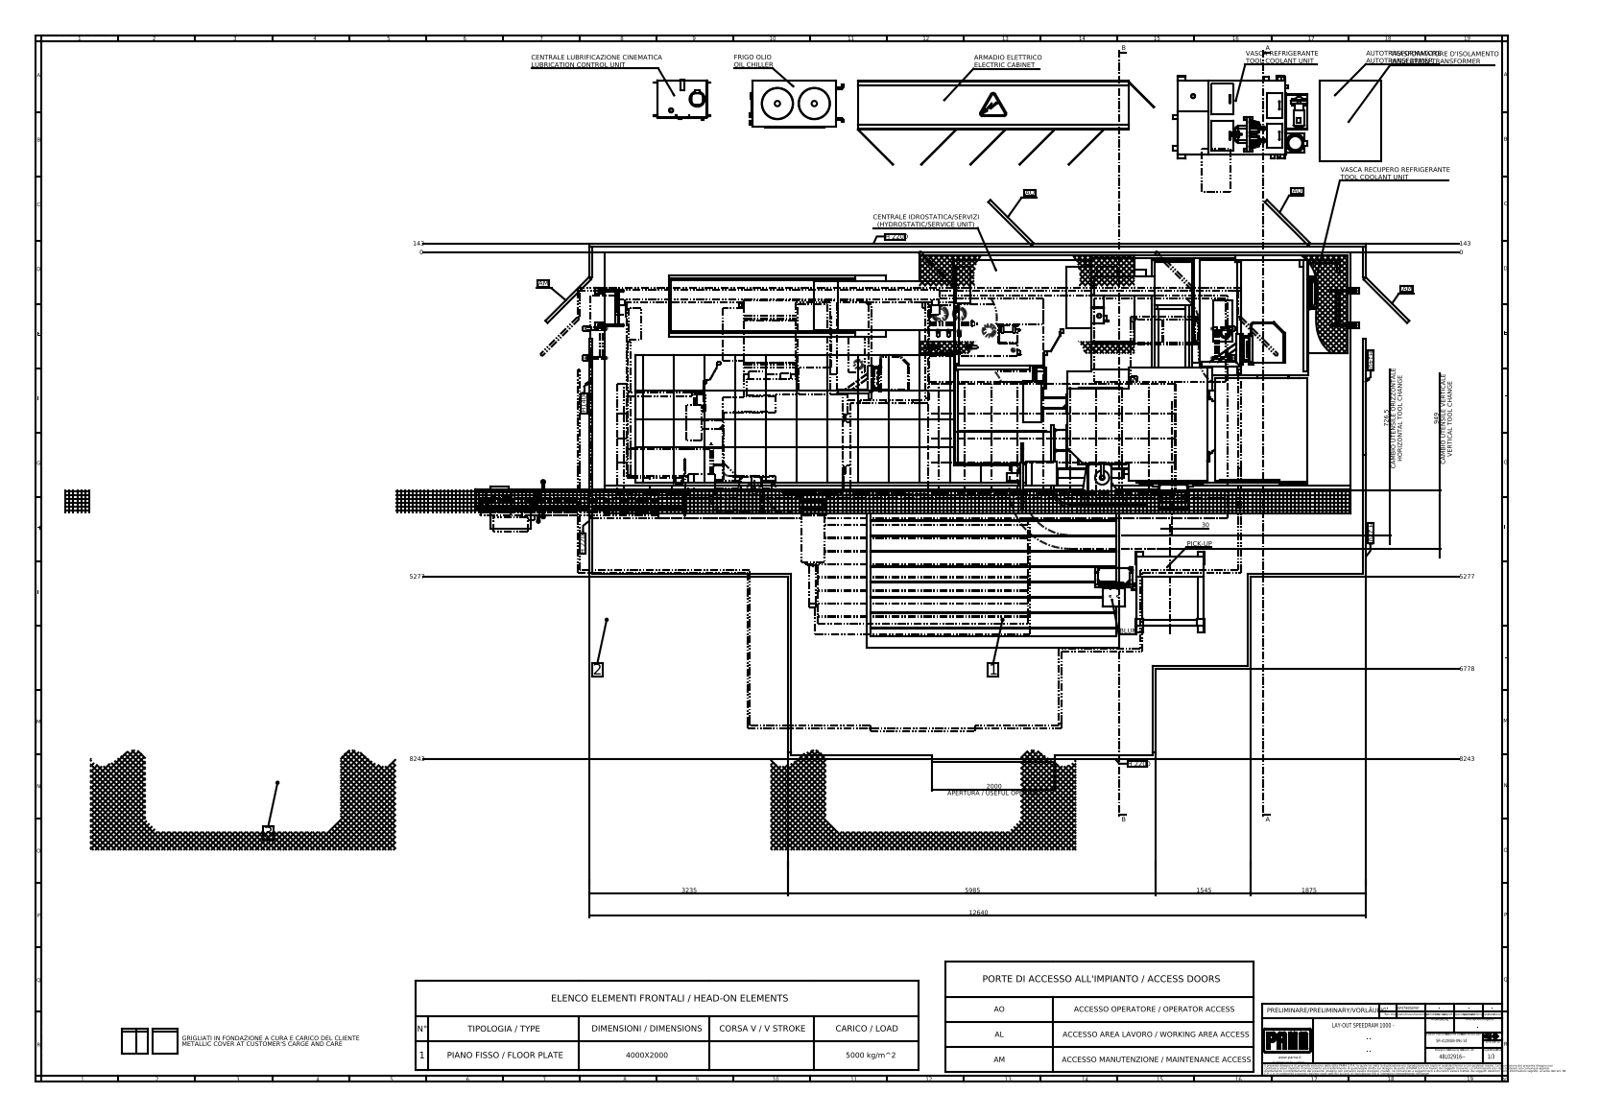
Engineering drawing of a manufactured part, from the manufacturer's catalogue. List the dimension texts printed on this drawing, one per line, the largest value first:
12640
8243
8243
6778
5985
5277
5277
3235
2000 APERTURA / USEFUL OPENING
1875
1545
949 CAMBIO UTENSILE VERTICALE VERTICAL TOOL CHANGE
726,5 CAMBIO UTENSILE ORIZZONTALE HORIZONTAL TOOL CHANGE
143
143
30
0
0
